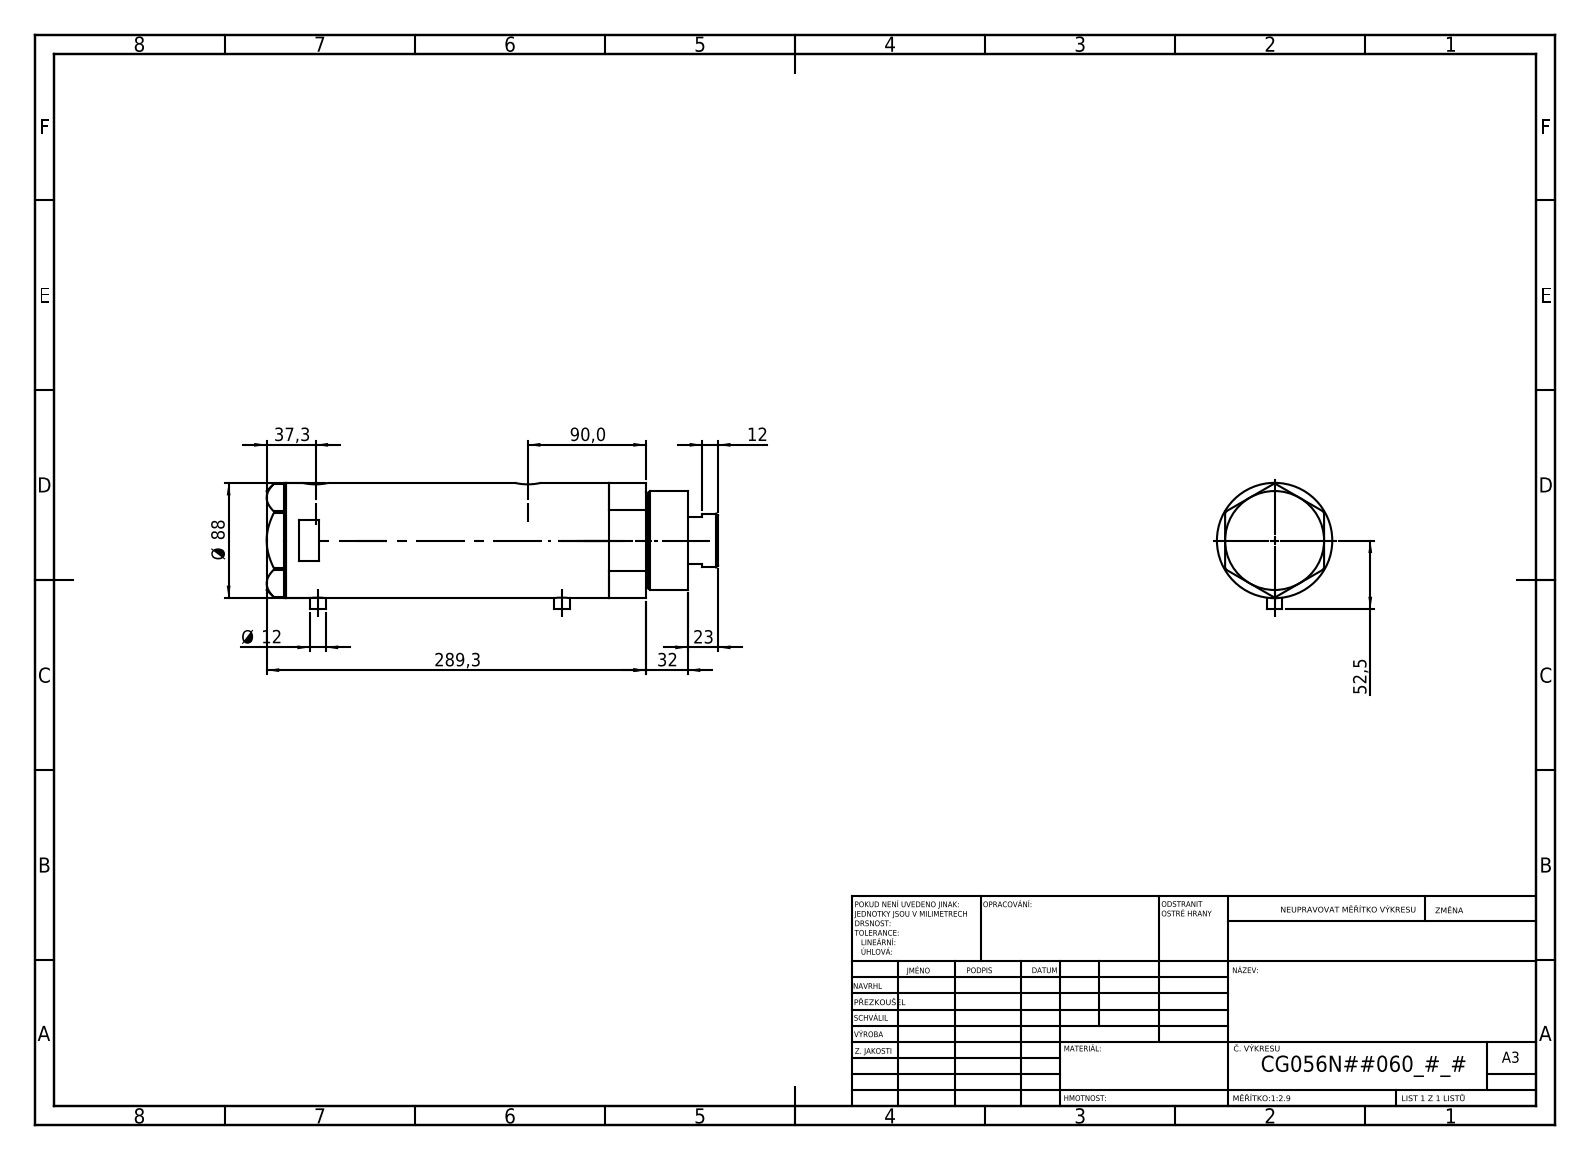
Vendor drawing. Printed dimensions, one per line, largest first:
289,3
90,0
Ø 88
52,5
37,3
32
23
12
Ø 12
